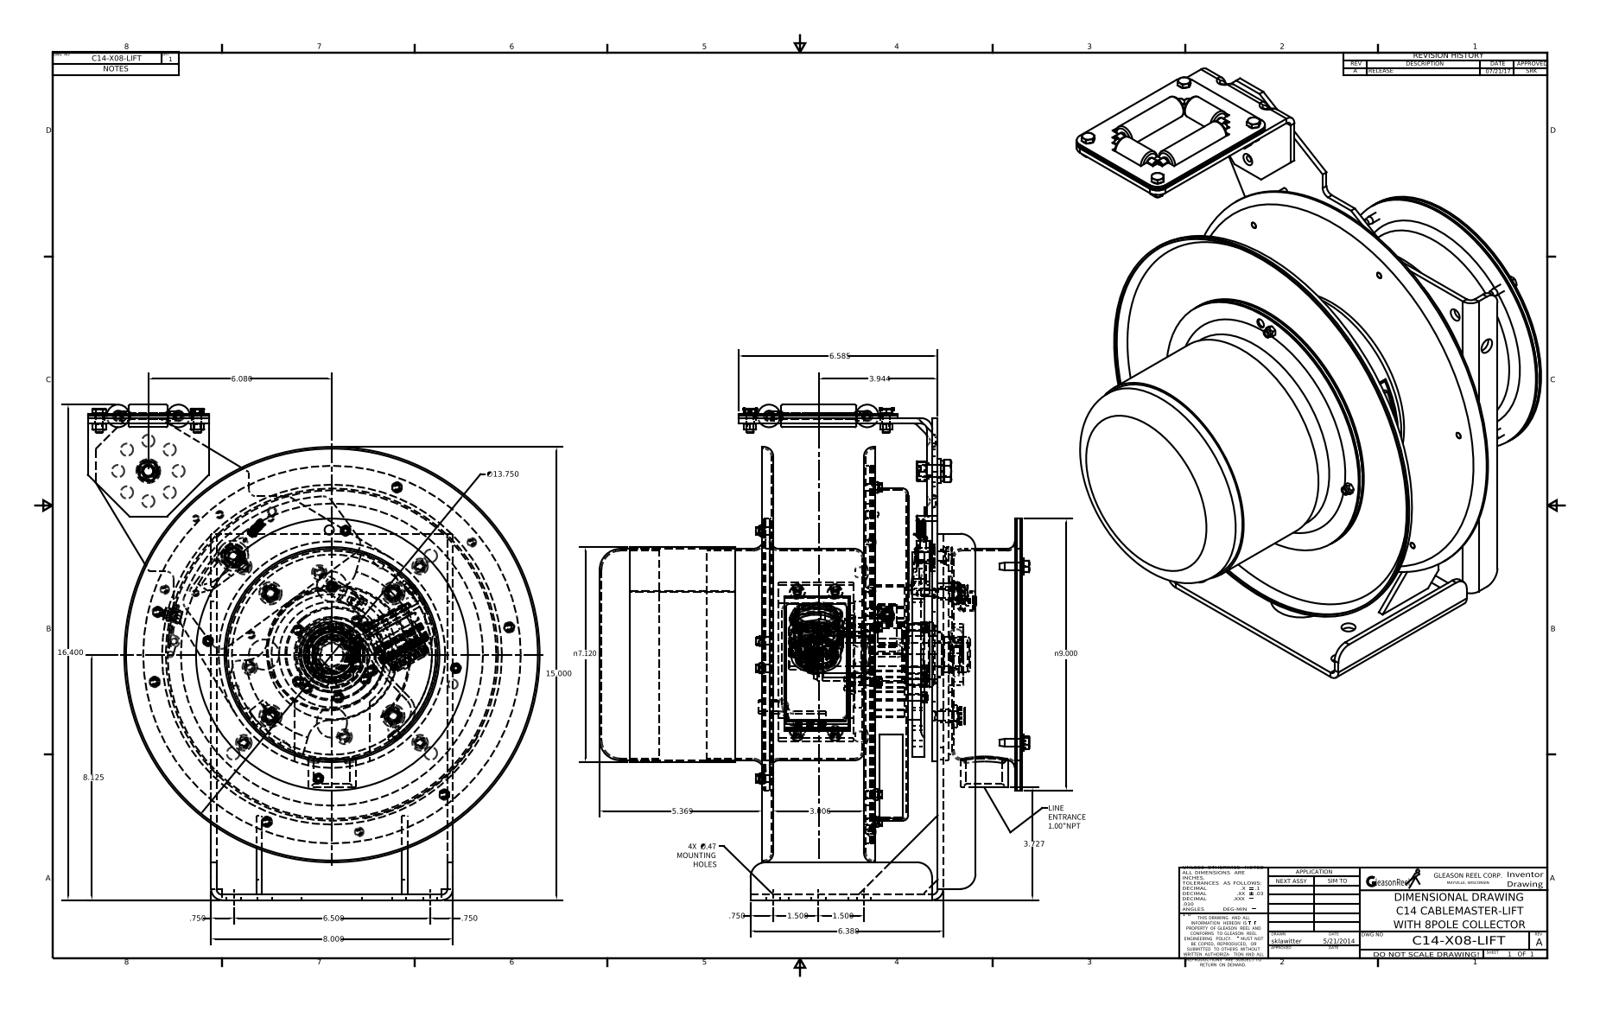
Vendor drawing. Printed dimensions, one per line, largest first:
16.400
15.000
∅13.750
n9.000
8.125
8.000
n7.120
6.585
6.500
6.380
6.080
5.369
3.944
3.727
3.006
1.500
1.500
.750
.750
.750
